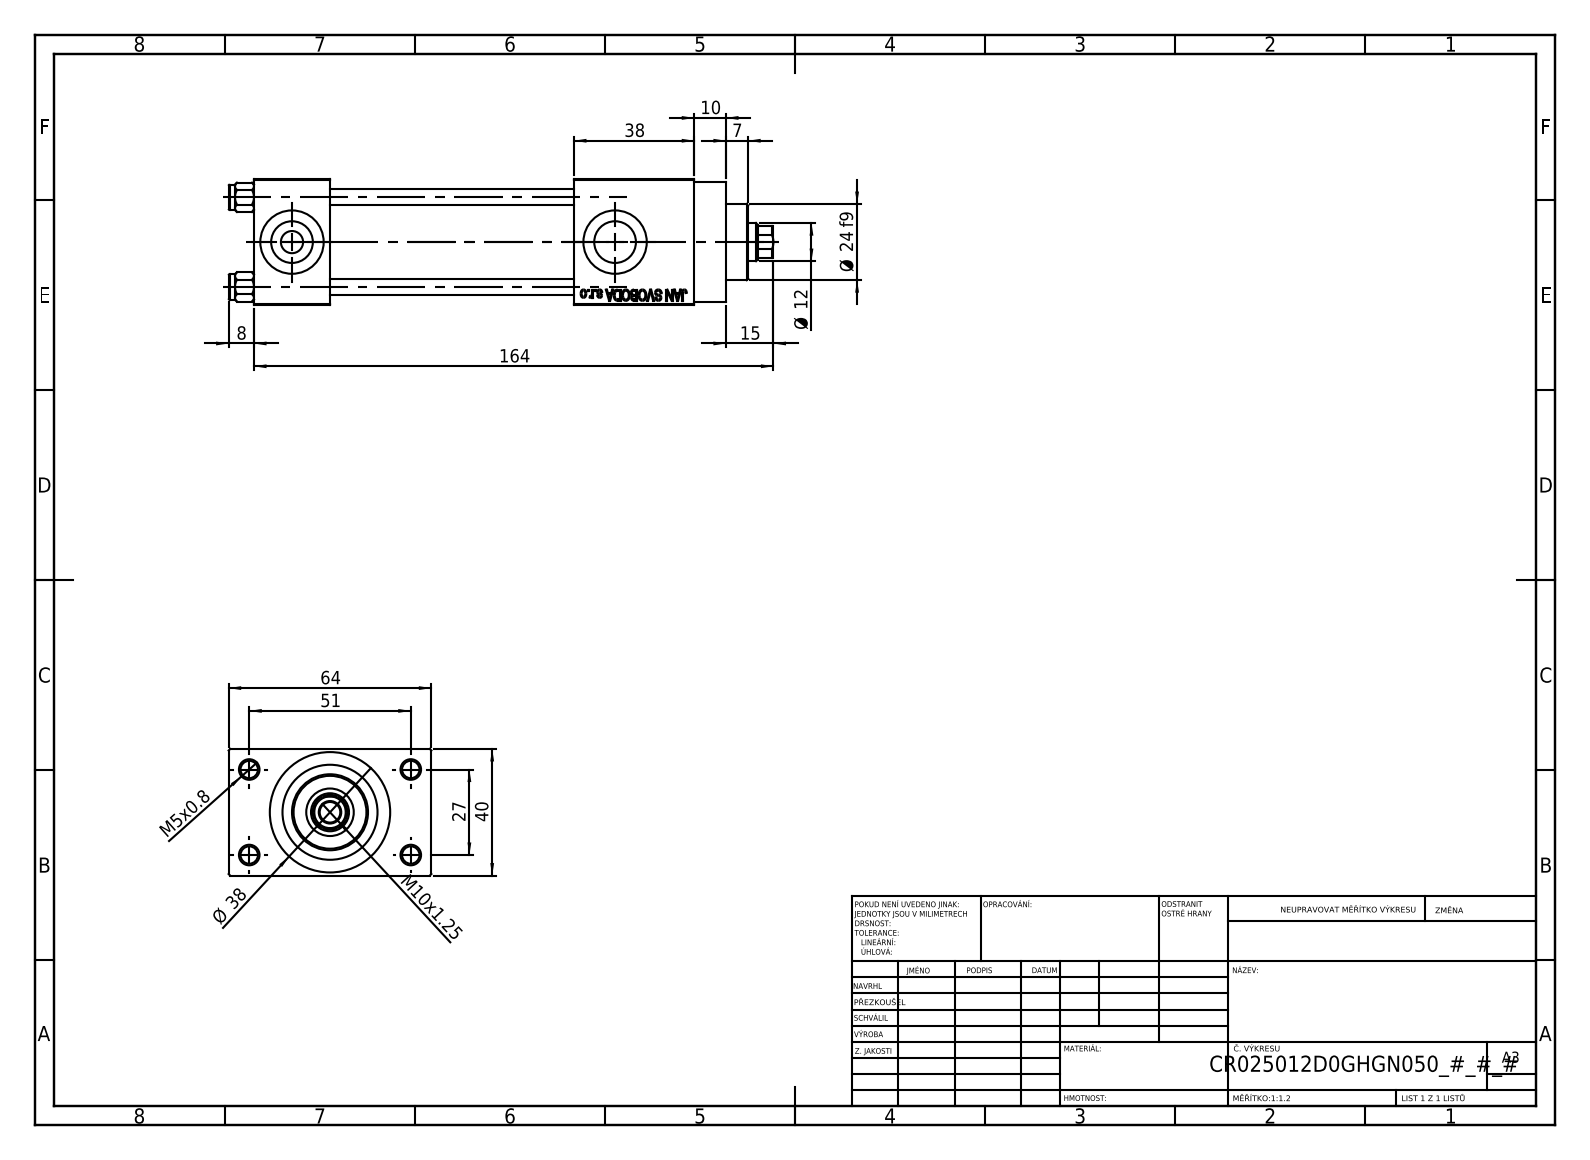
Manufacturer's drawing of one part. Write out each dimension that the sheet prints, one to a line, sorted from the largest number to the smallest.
164
64
51
40
38
Ø 38
27
Ø 24 f9
15
Ø 12
10
M10x1.25
8
7
M5x0.8
